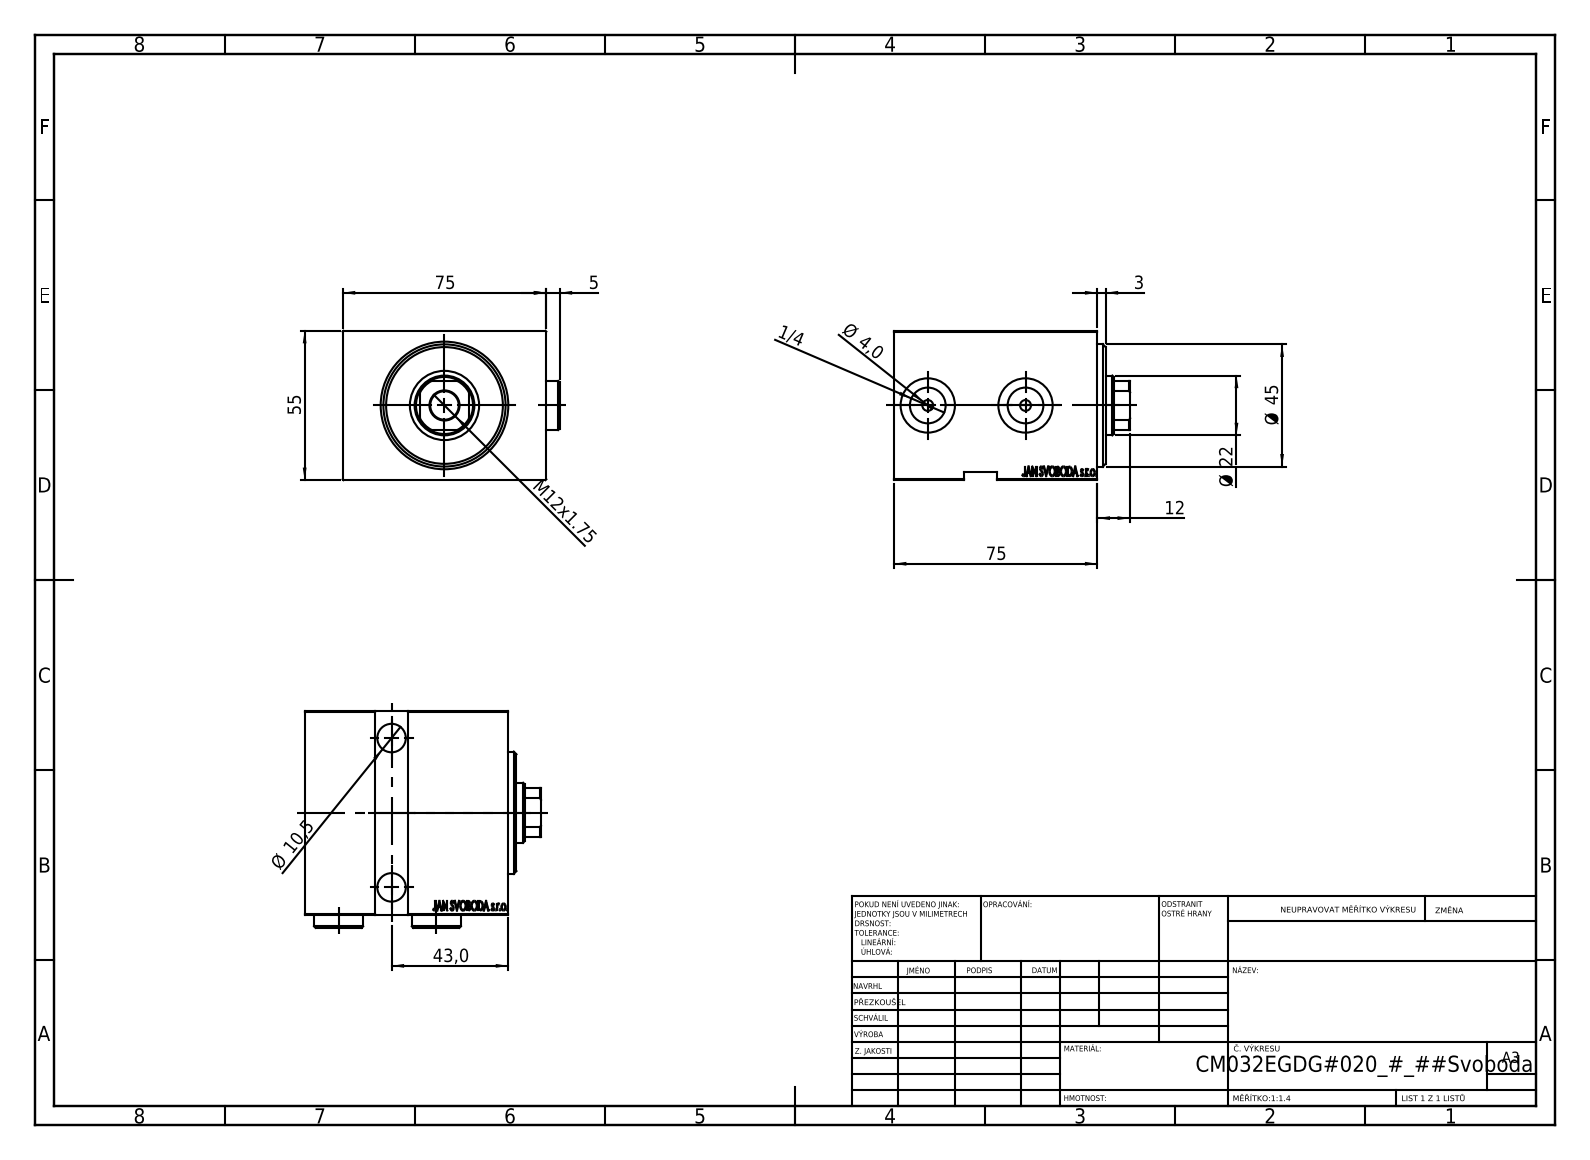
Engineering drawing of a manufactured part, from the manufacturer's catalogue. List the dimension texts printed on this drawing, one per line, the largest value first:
75
75
55
Ø 45
43,0
Ø 22
M12x1.75
12
Ø 10,5
5
Ø 4,0
3
1/4
